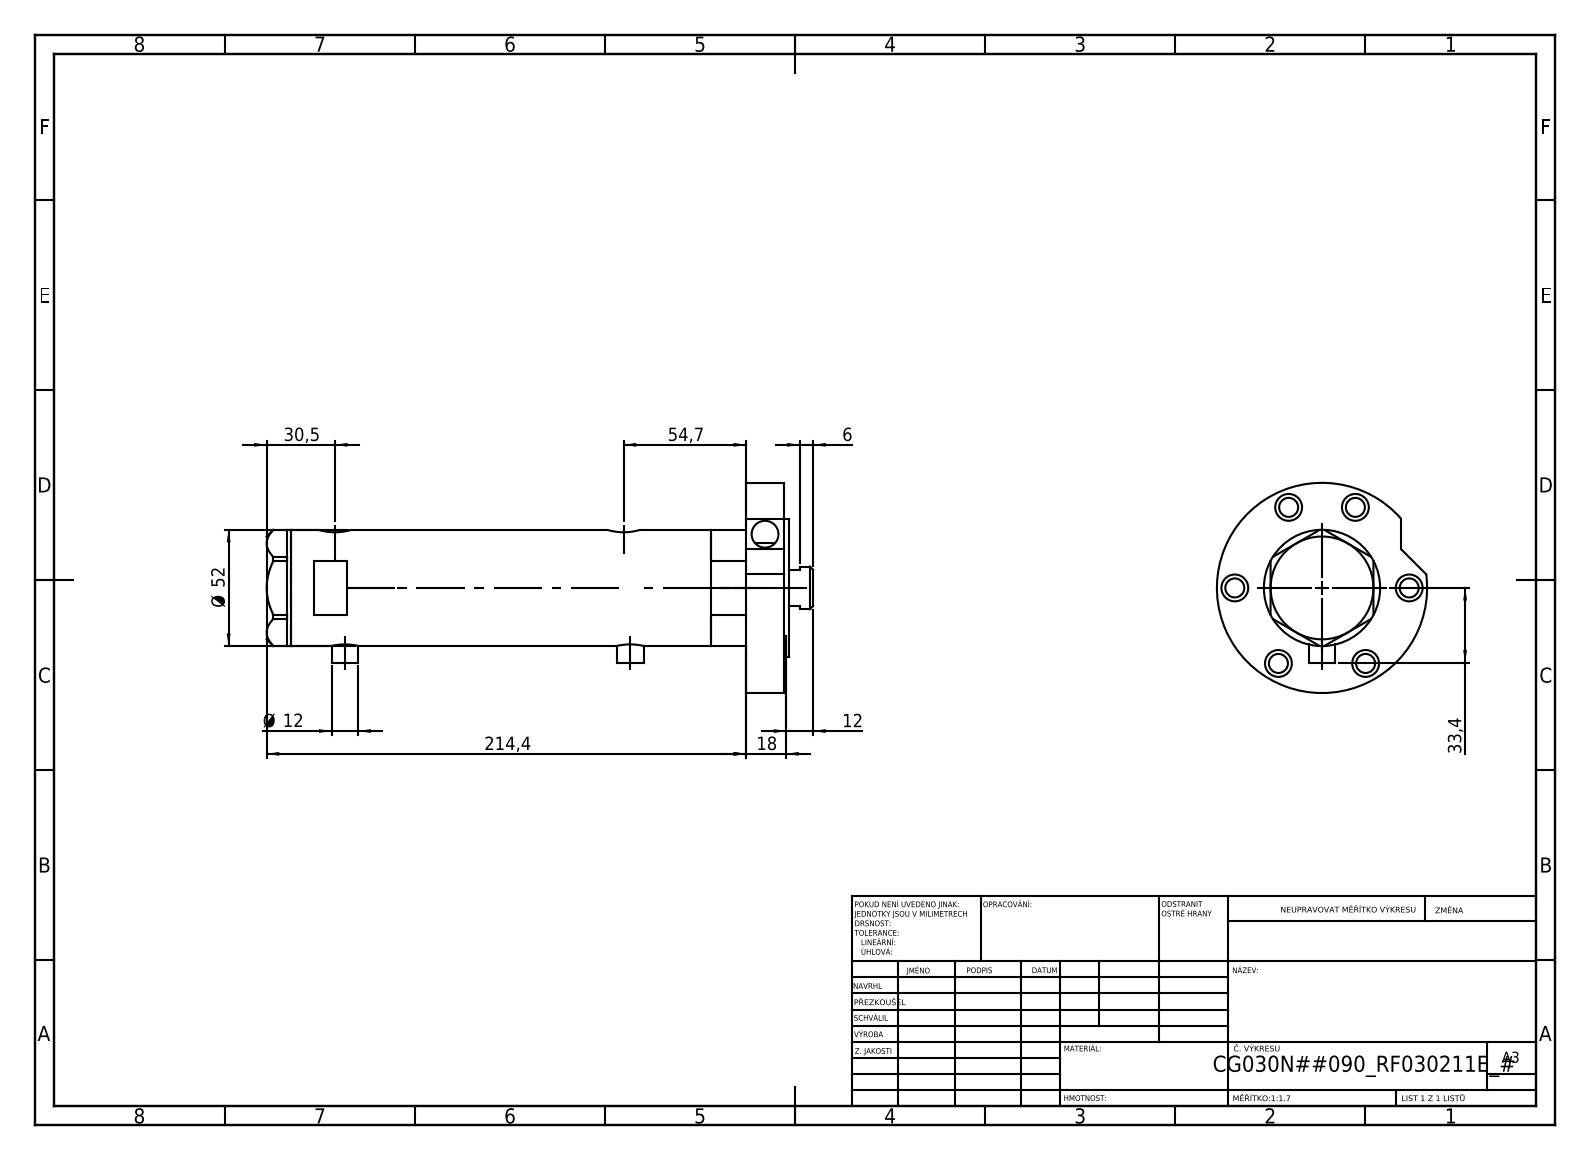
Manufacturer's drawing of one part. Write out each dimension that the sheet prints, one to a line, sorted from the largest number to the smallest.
214,4
54,7
Ø 52
33,4
30,5
18
12
Ø 12
6
